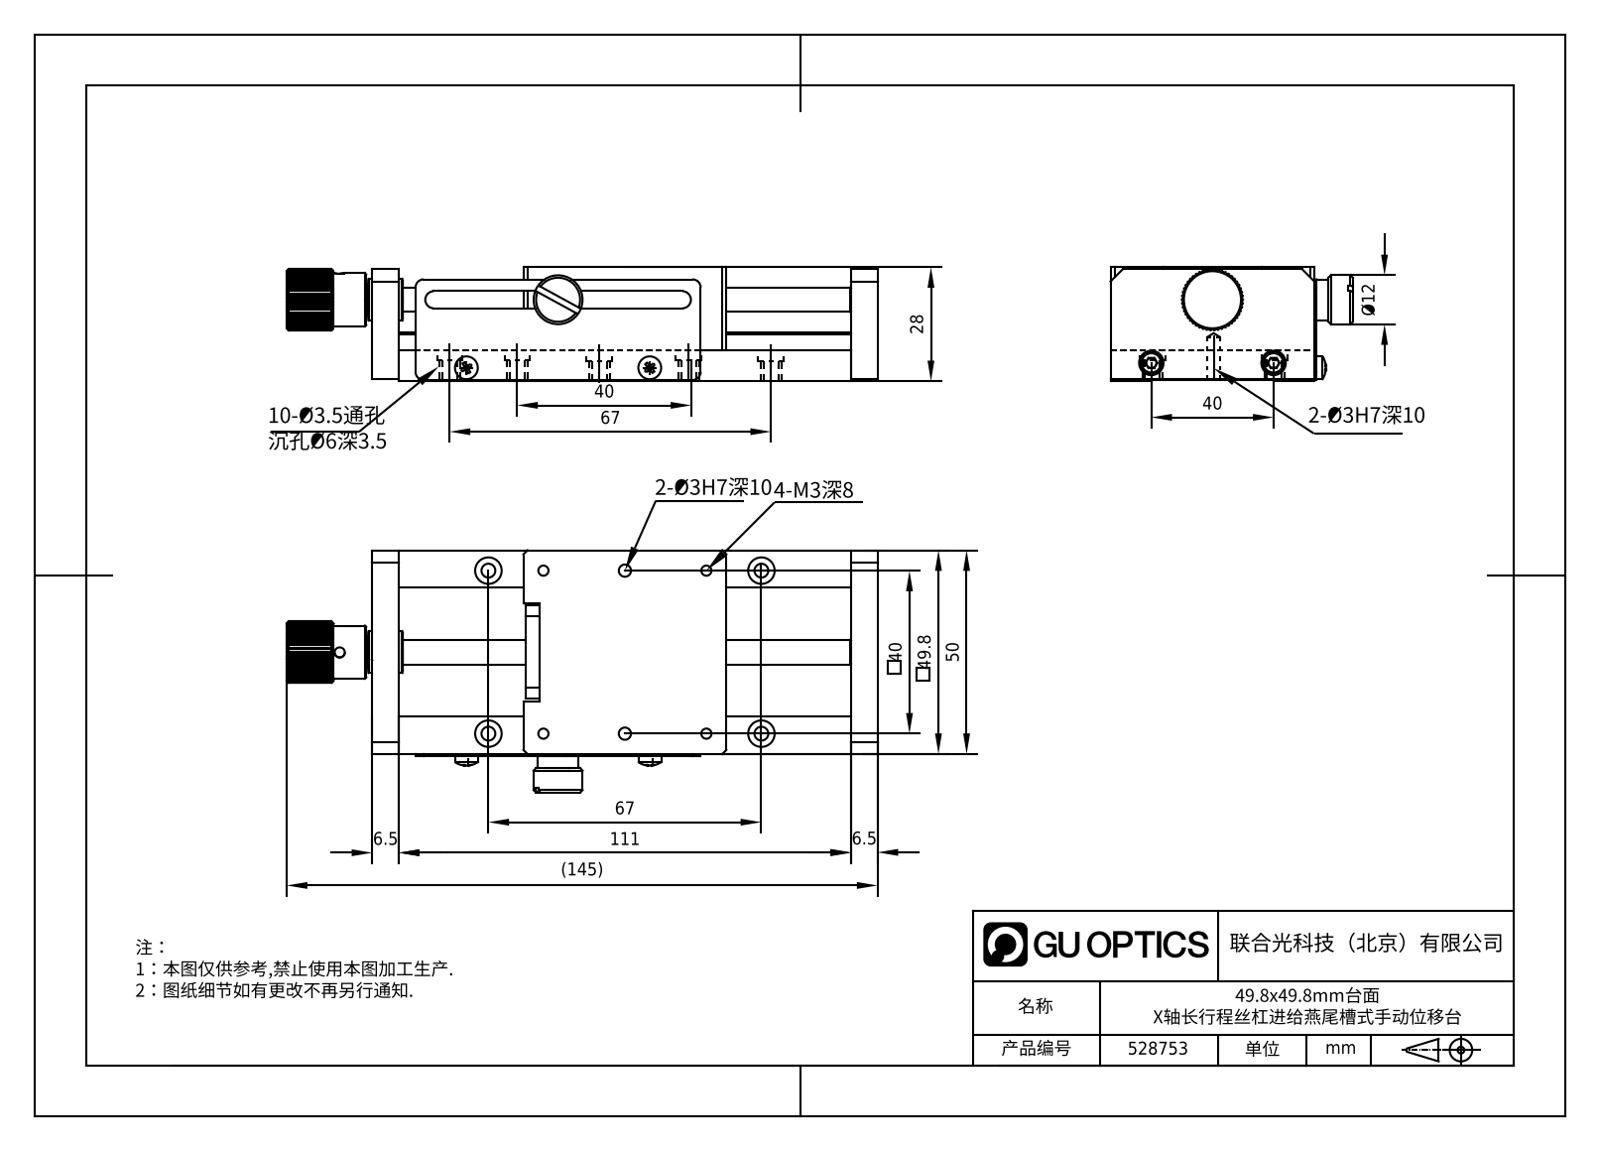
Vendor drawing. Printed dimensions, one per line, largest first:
(145)
111
67
67
50
49.8
40
40
40
28
Ø12
6.5
6.5
